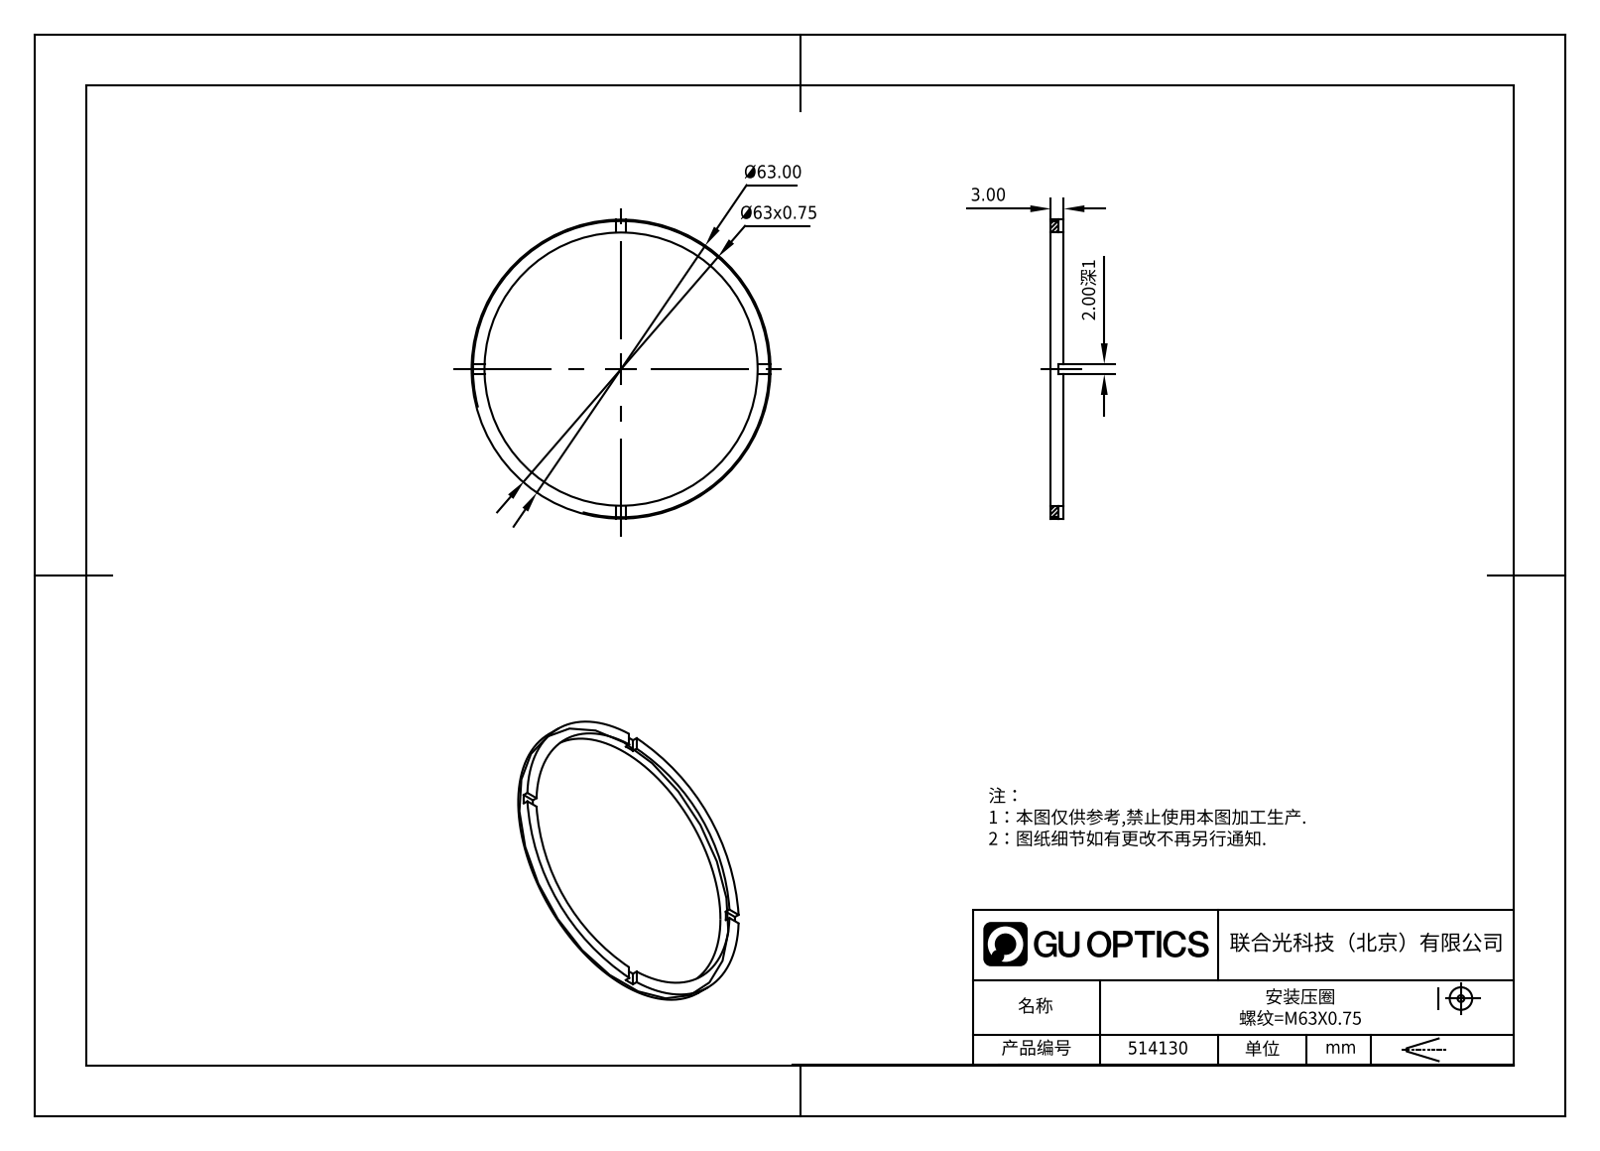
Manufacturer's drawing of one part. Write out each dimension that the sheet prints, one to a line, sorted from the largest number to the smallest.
Ø63.00
Ø63x0.75
3.00
2.00深1
